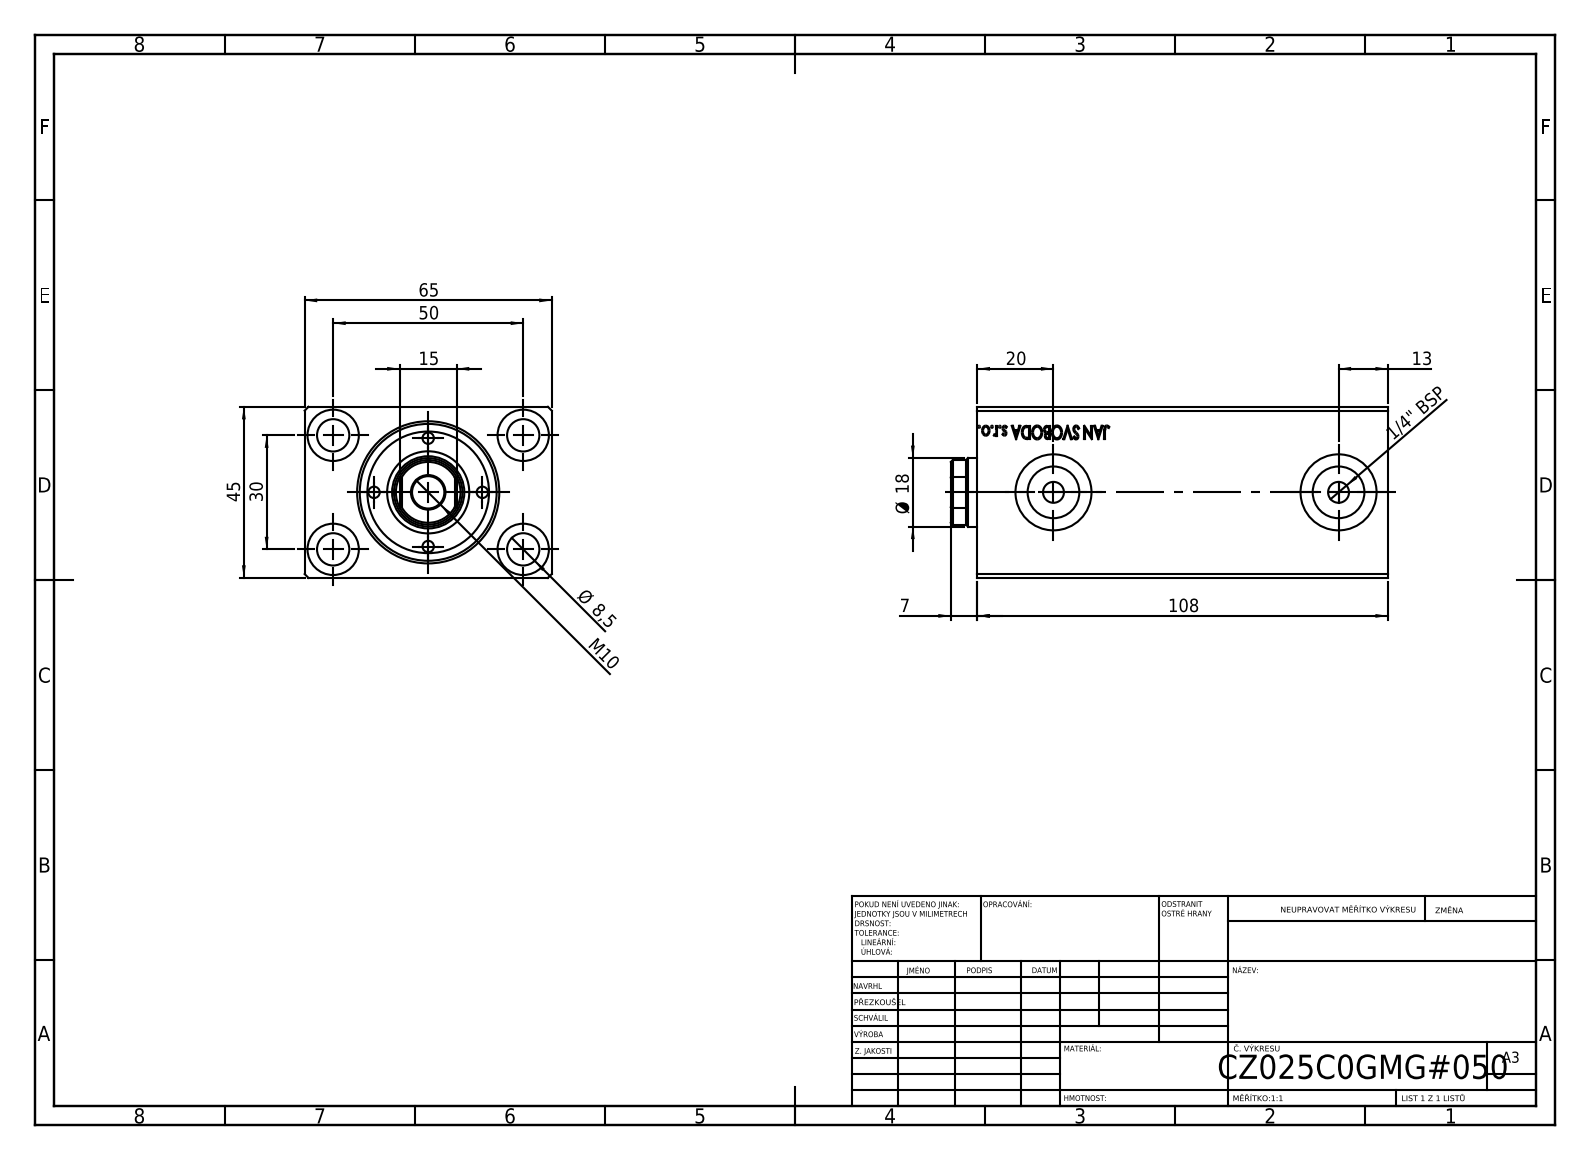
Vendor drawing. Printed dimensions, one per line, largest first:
108
65
50
45
30
20
Ø 18
15
13
M10
Ø 8,5
7
1/4" BSP
